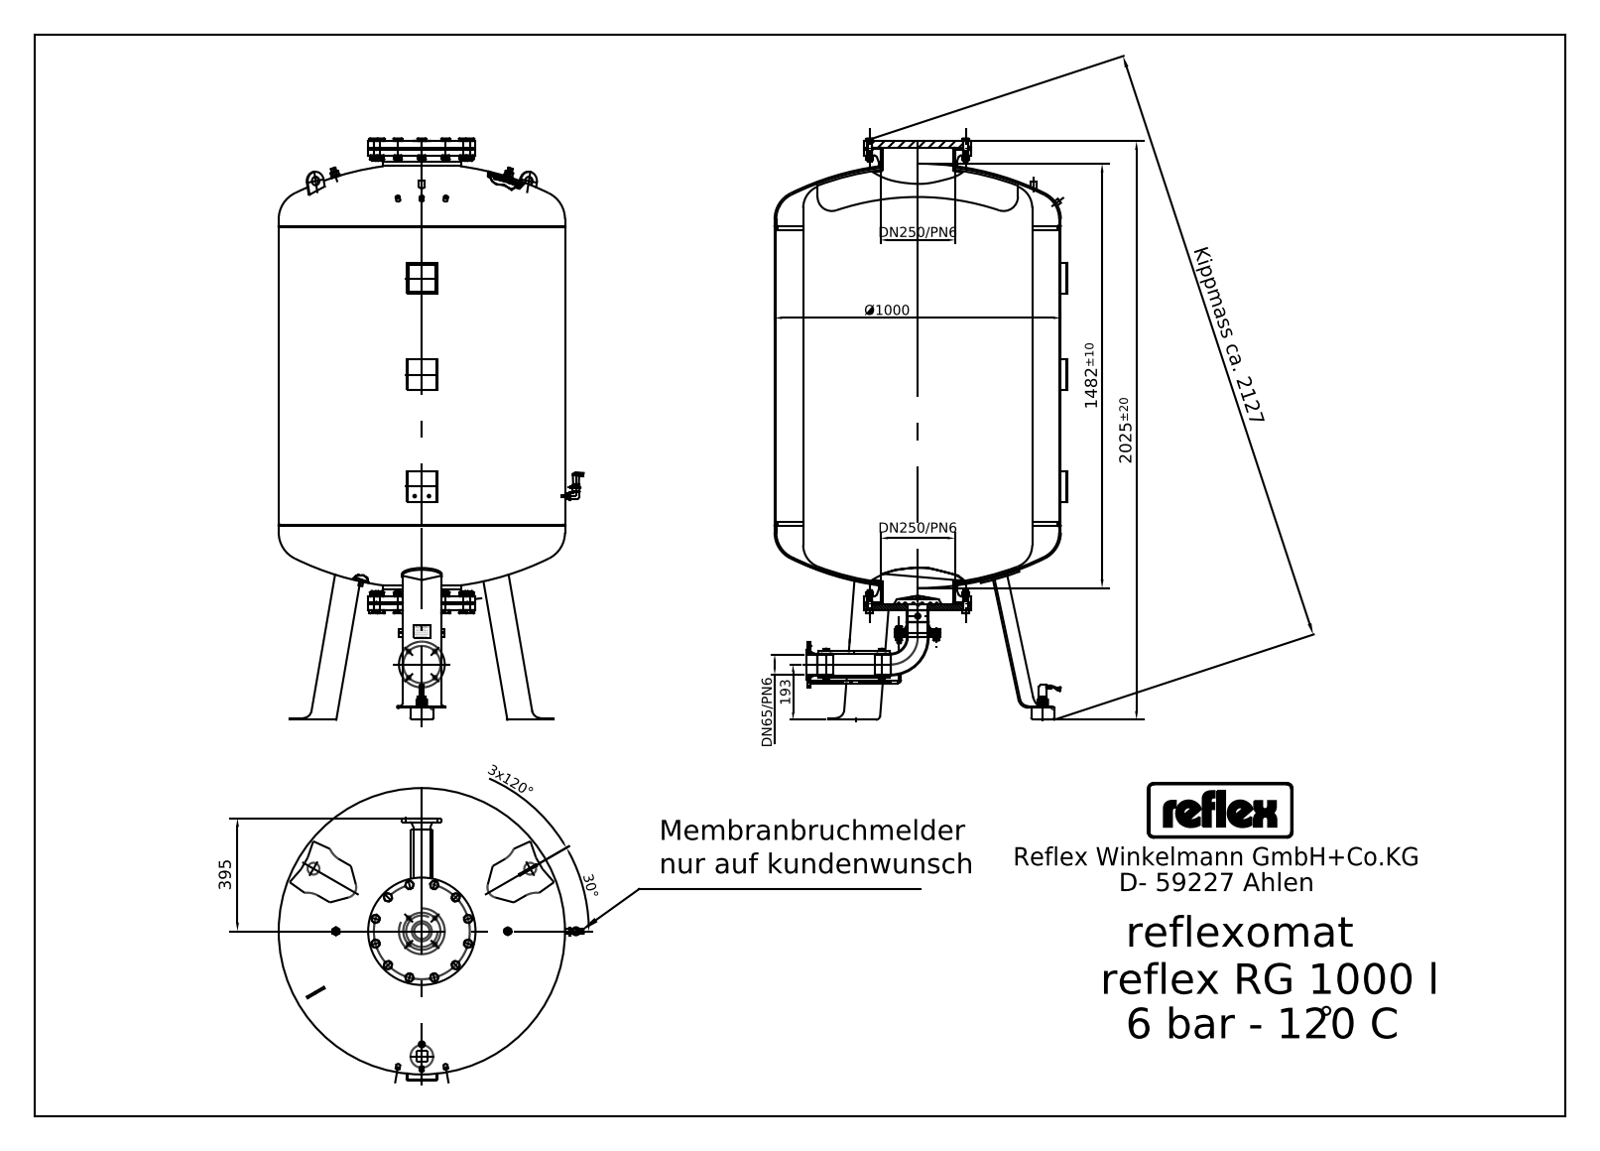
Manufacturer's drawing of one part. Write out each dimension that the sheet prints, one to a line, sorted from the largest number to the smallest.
Kippmass ca. 2127
2025±20
1482±10
Ø1000
395
DN250/PN6
DN250/PN6
193
3x120°
DN65/PN6
30°
